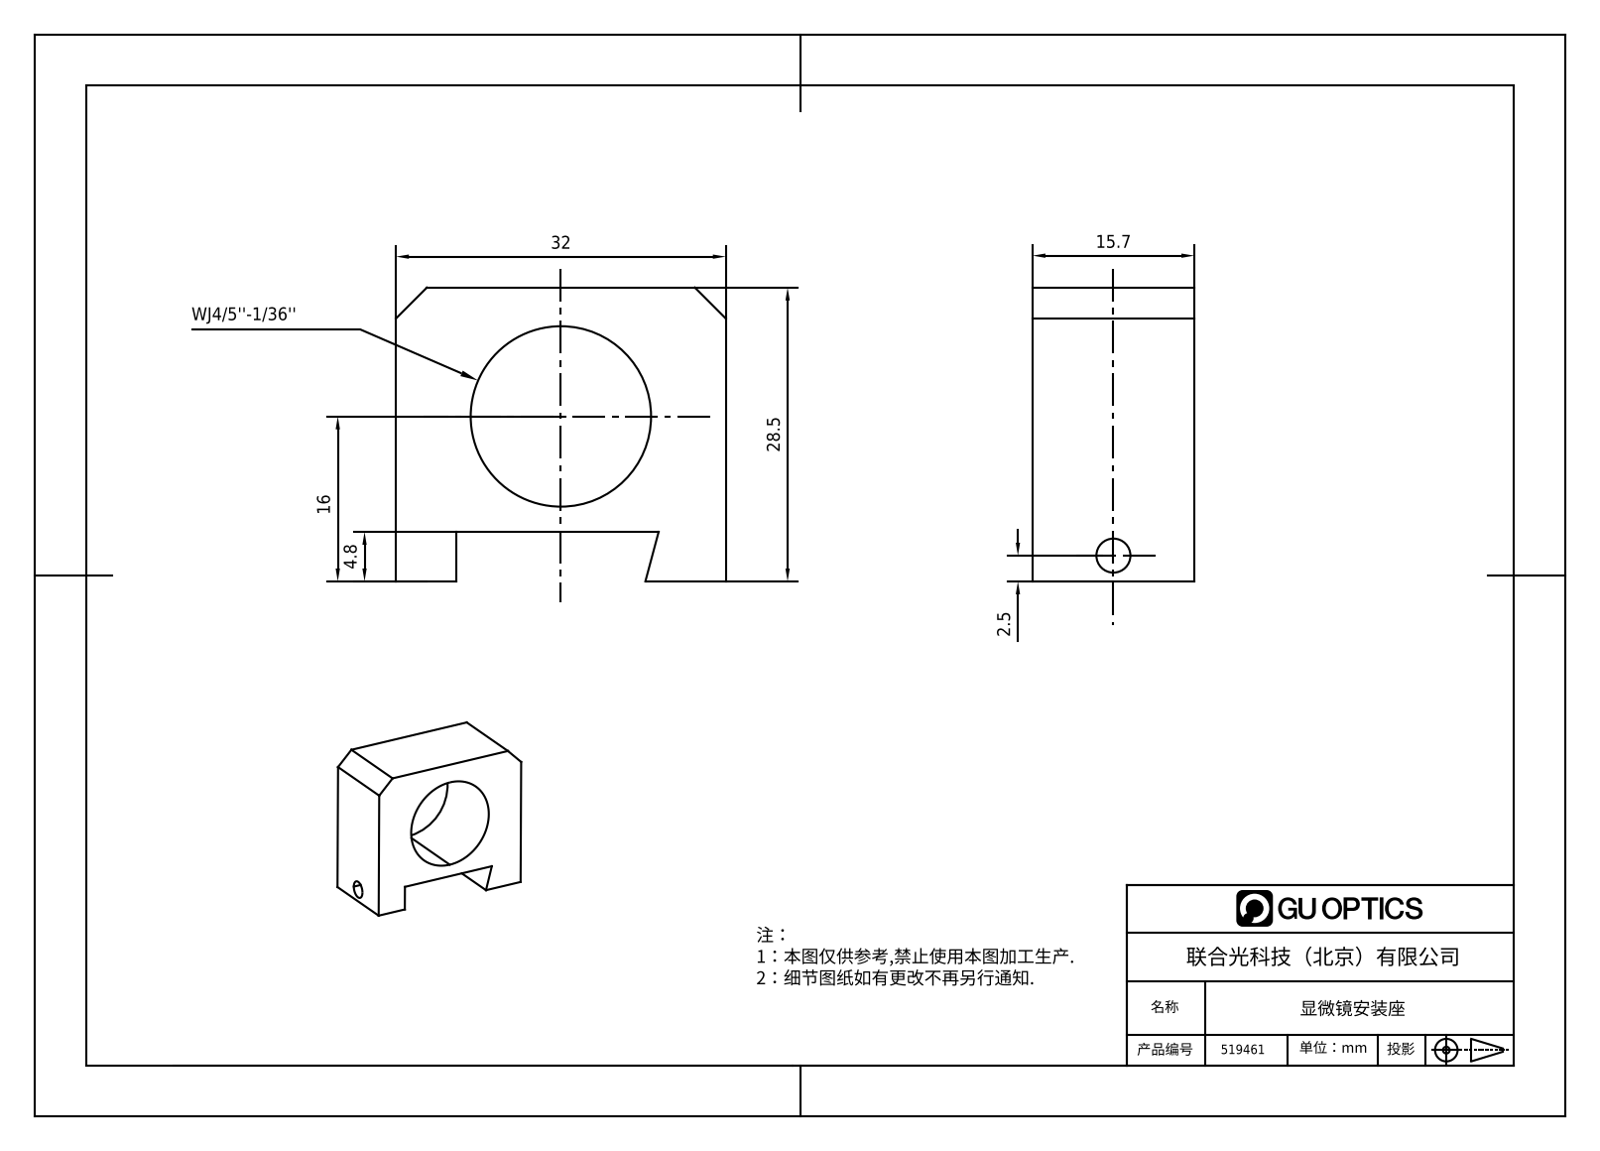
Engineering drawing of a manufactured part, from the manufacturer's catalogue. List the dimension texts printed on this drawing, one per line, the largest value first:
32
28.5
16
15.7
4.8
2.5
